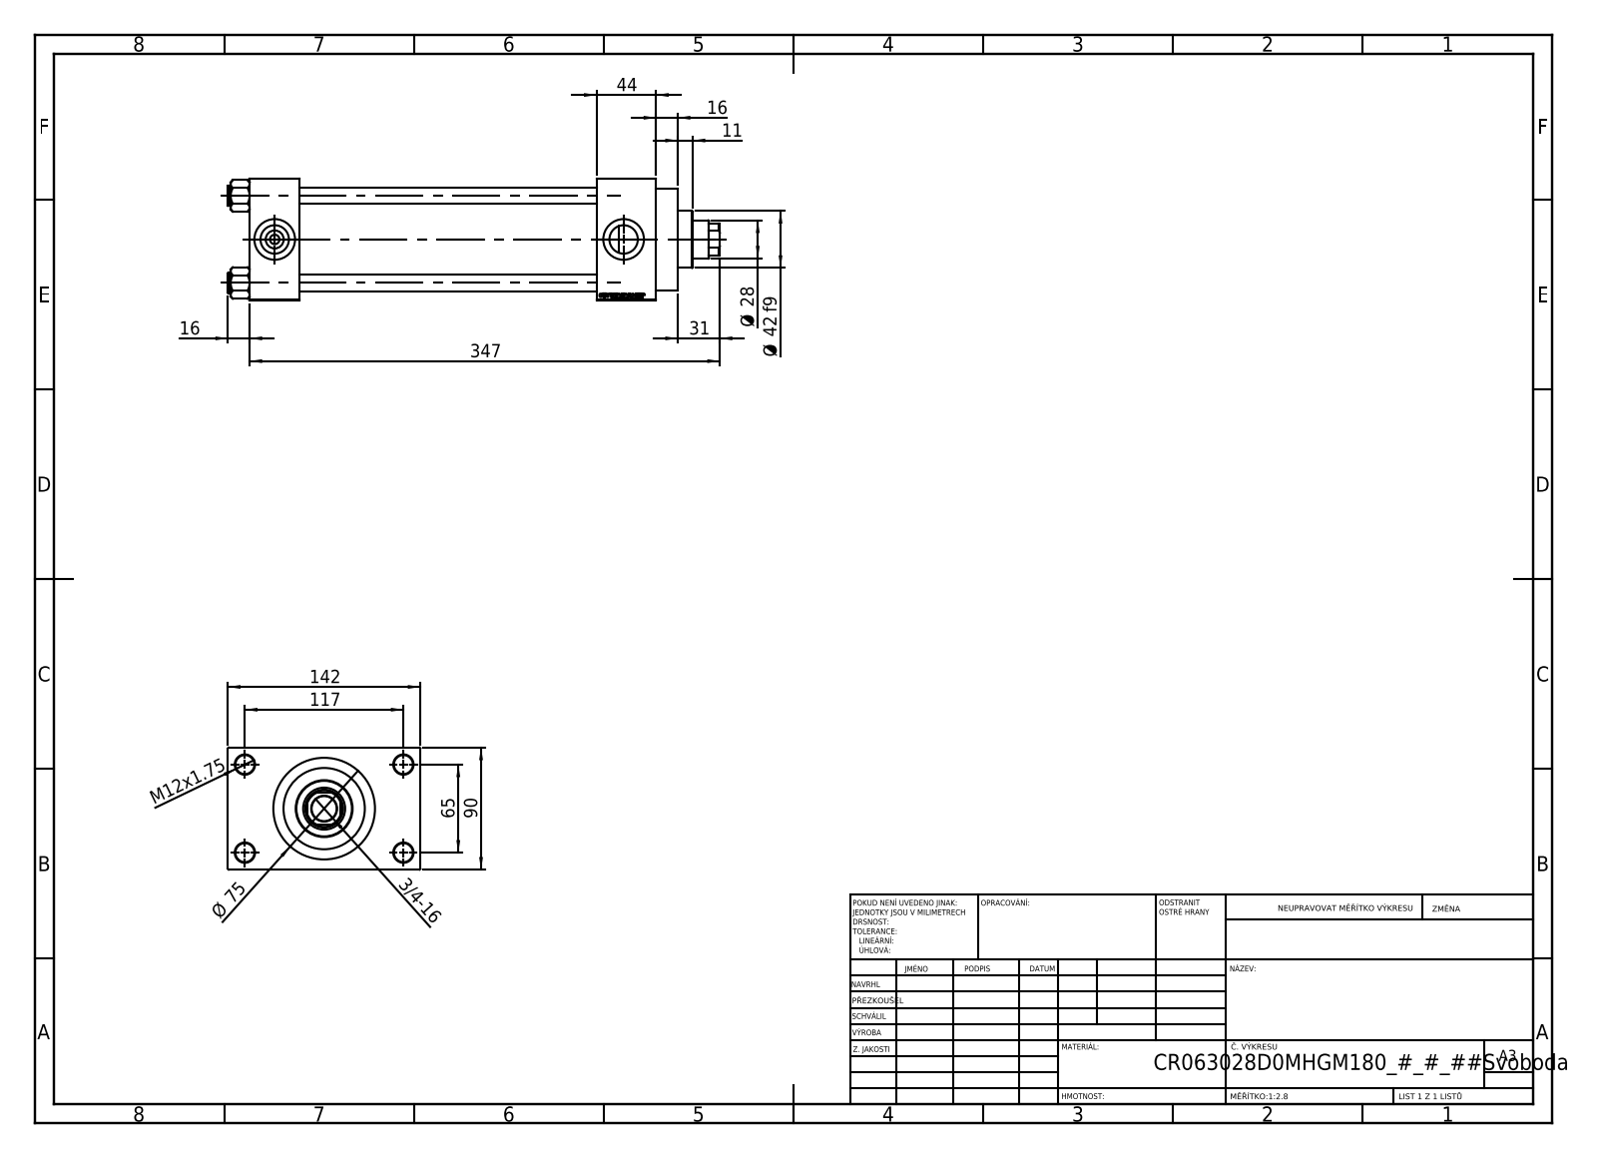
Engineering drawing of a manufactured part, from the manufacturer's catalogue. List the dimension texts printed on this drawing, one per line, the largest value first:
347
142
117
90
Ø 75
65
44
Ø 42 f9
31
Ø 28
16
16
M12x1.75
11
3/4-16
